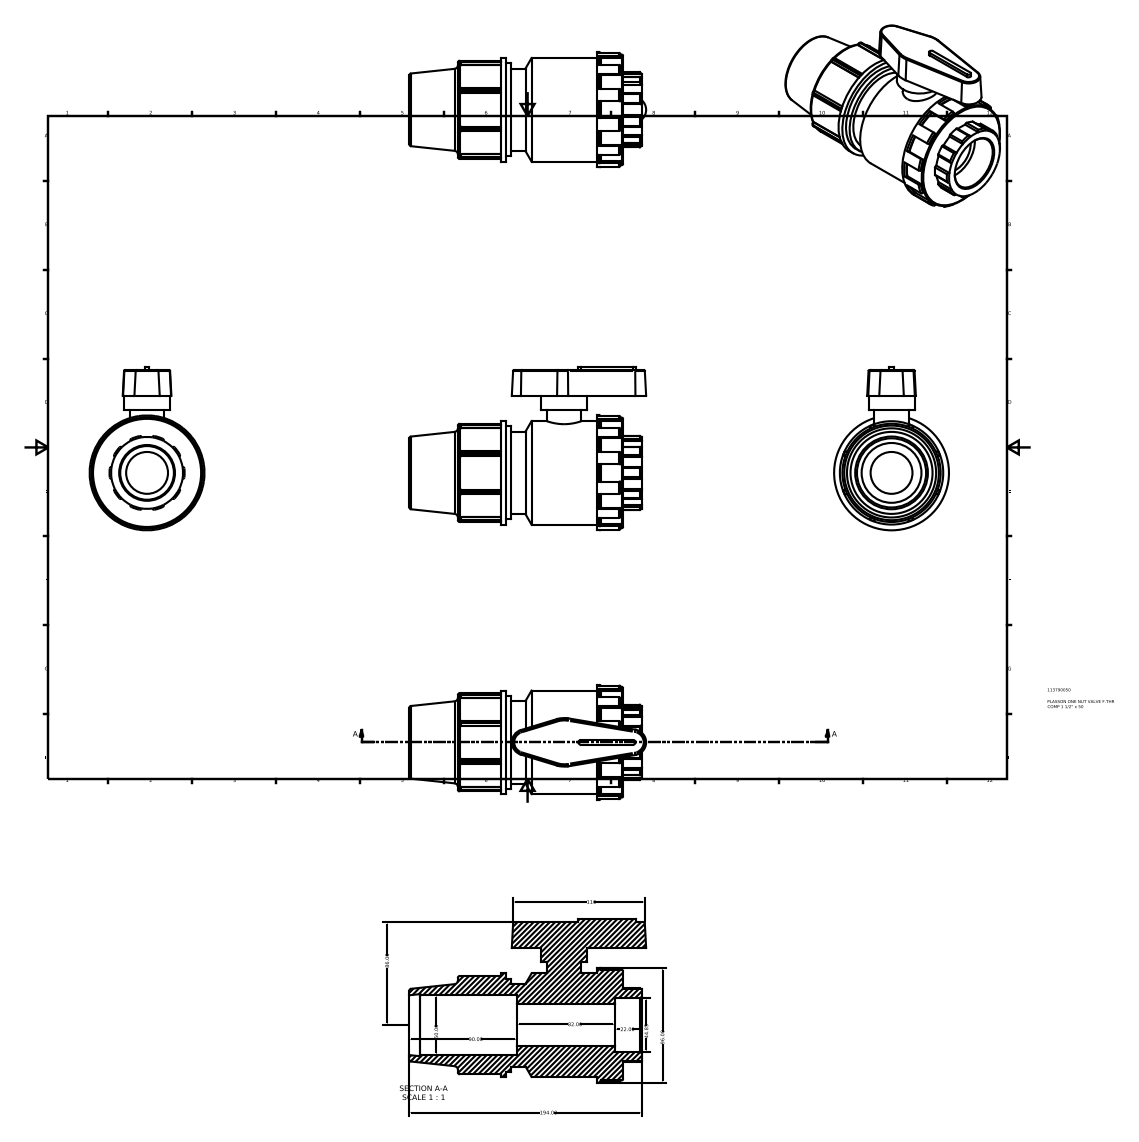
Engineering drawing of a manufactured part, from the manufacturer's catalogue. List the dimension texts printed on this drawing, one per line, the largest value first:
194.00
110
96.00
90.00
86.00
82.00
50.00
44.85
22.00
